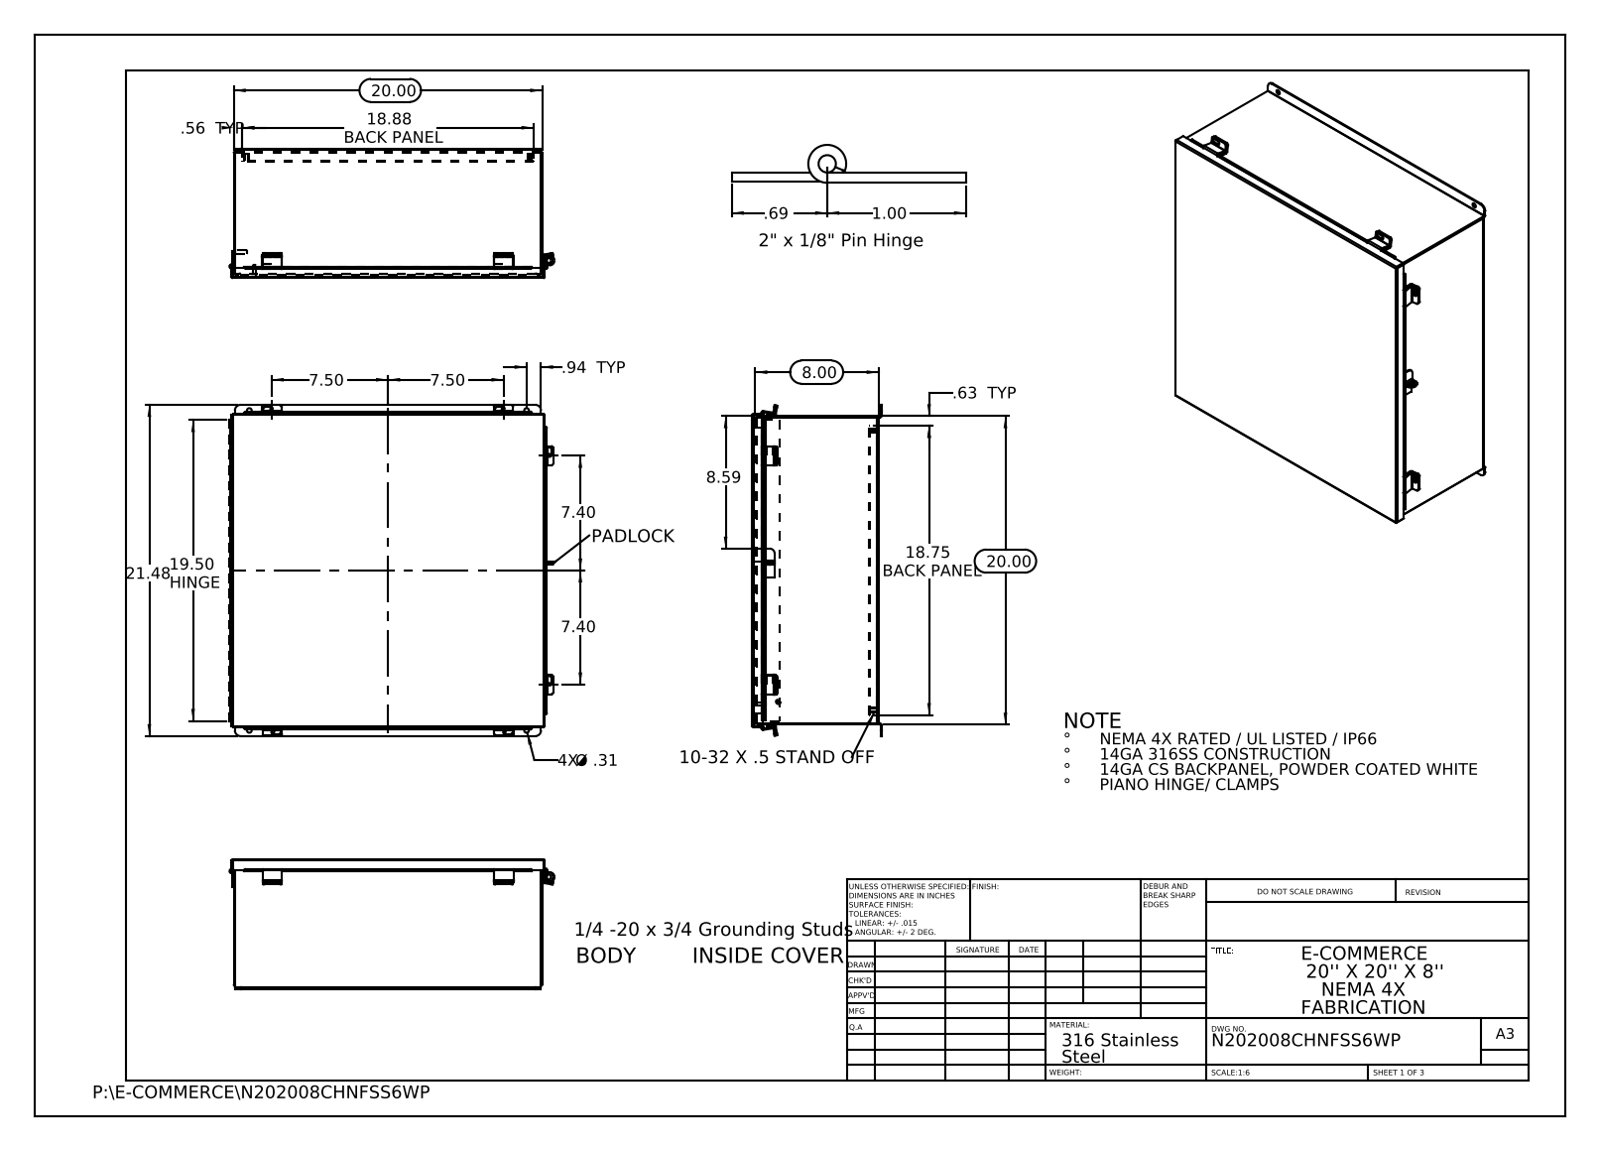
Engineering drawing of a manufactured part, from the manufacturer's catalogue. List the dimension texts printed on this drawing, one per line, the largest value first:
21.48
20.00
20.00
19.50 HINGE
18.88 BACK PANEL
18.75 BACK PANEL
8.59
8.00
7.50
7.50
7.40
7.40
1.00
.94 TYP
.69
.63 TYP
.56 TYP
4X Ø .31
